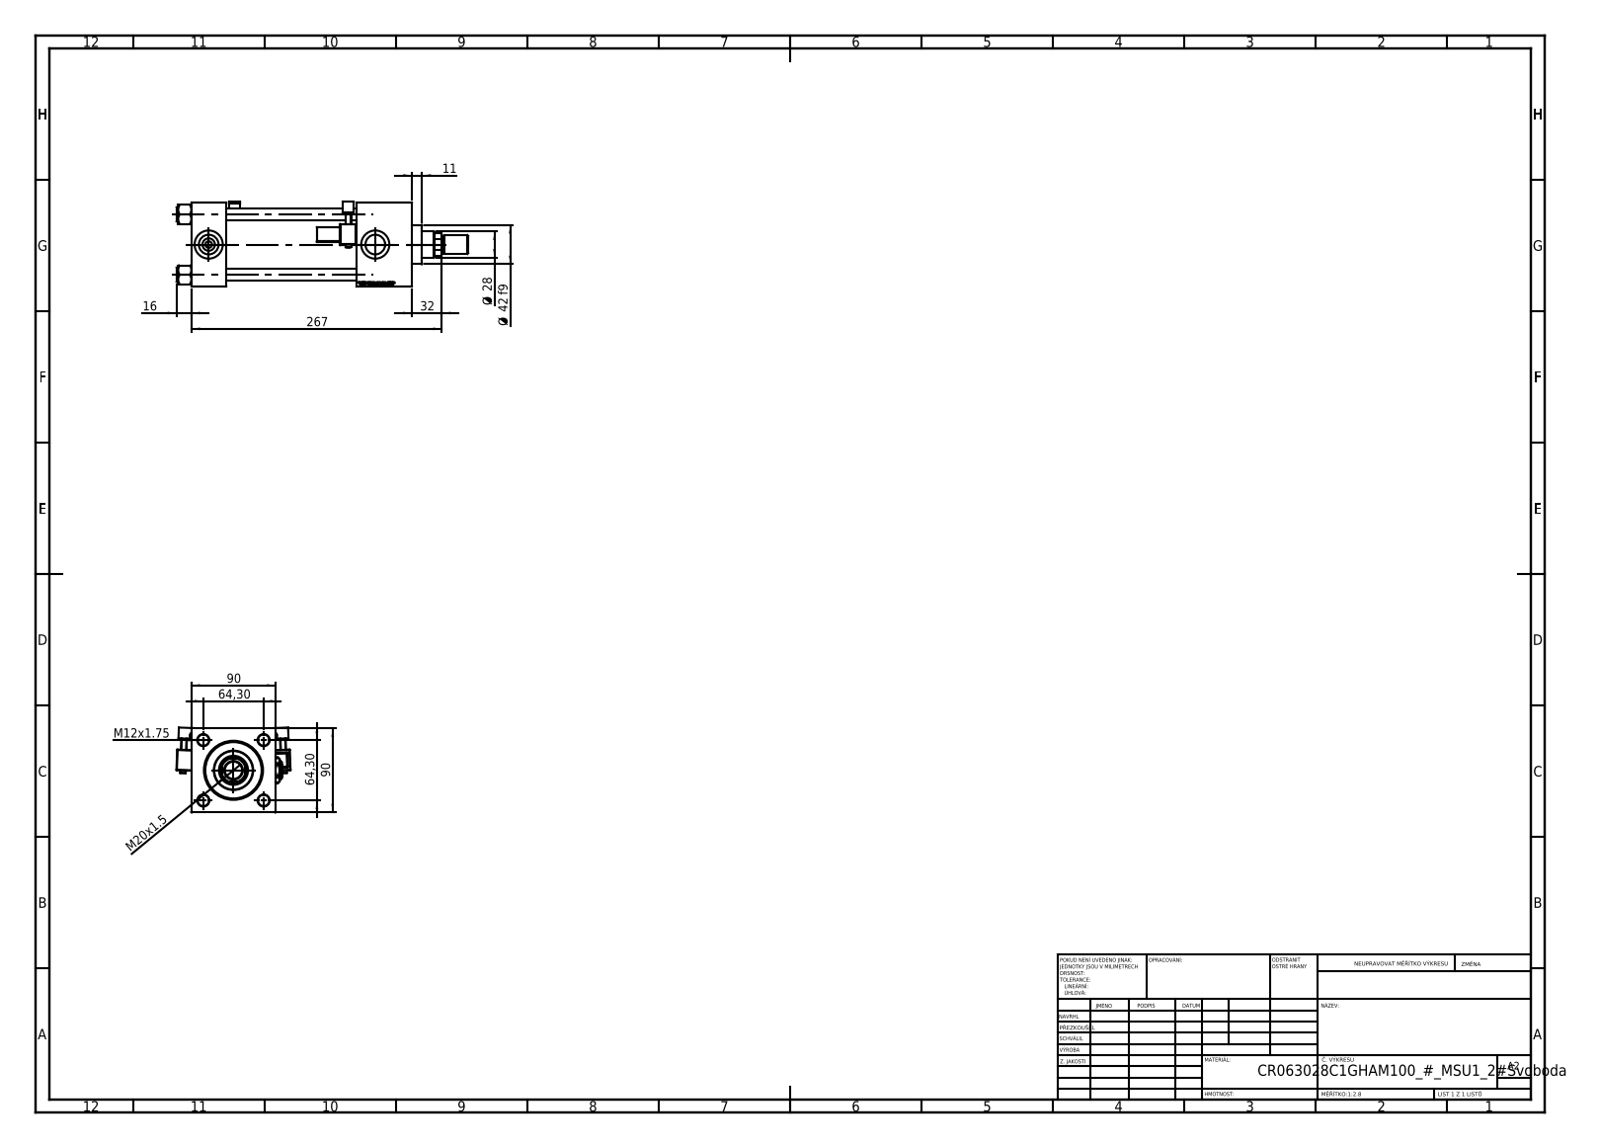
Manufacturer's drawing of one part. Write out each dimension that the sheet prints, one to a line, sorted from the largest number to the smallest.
267
90
90
64,30
64,30
Ø 42 f9
32
Ø 28
M20x1.5
16
M12x1.75
11
